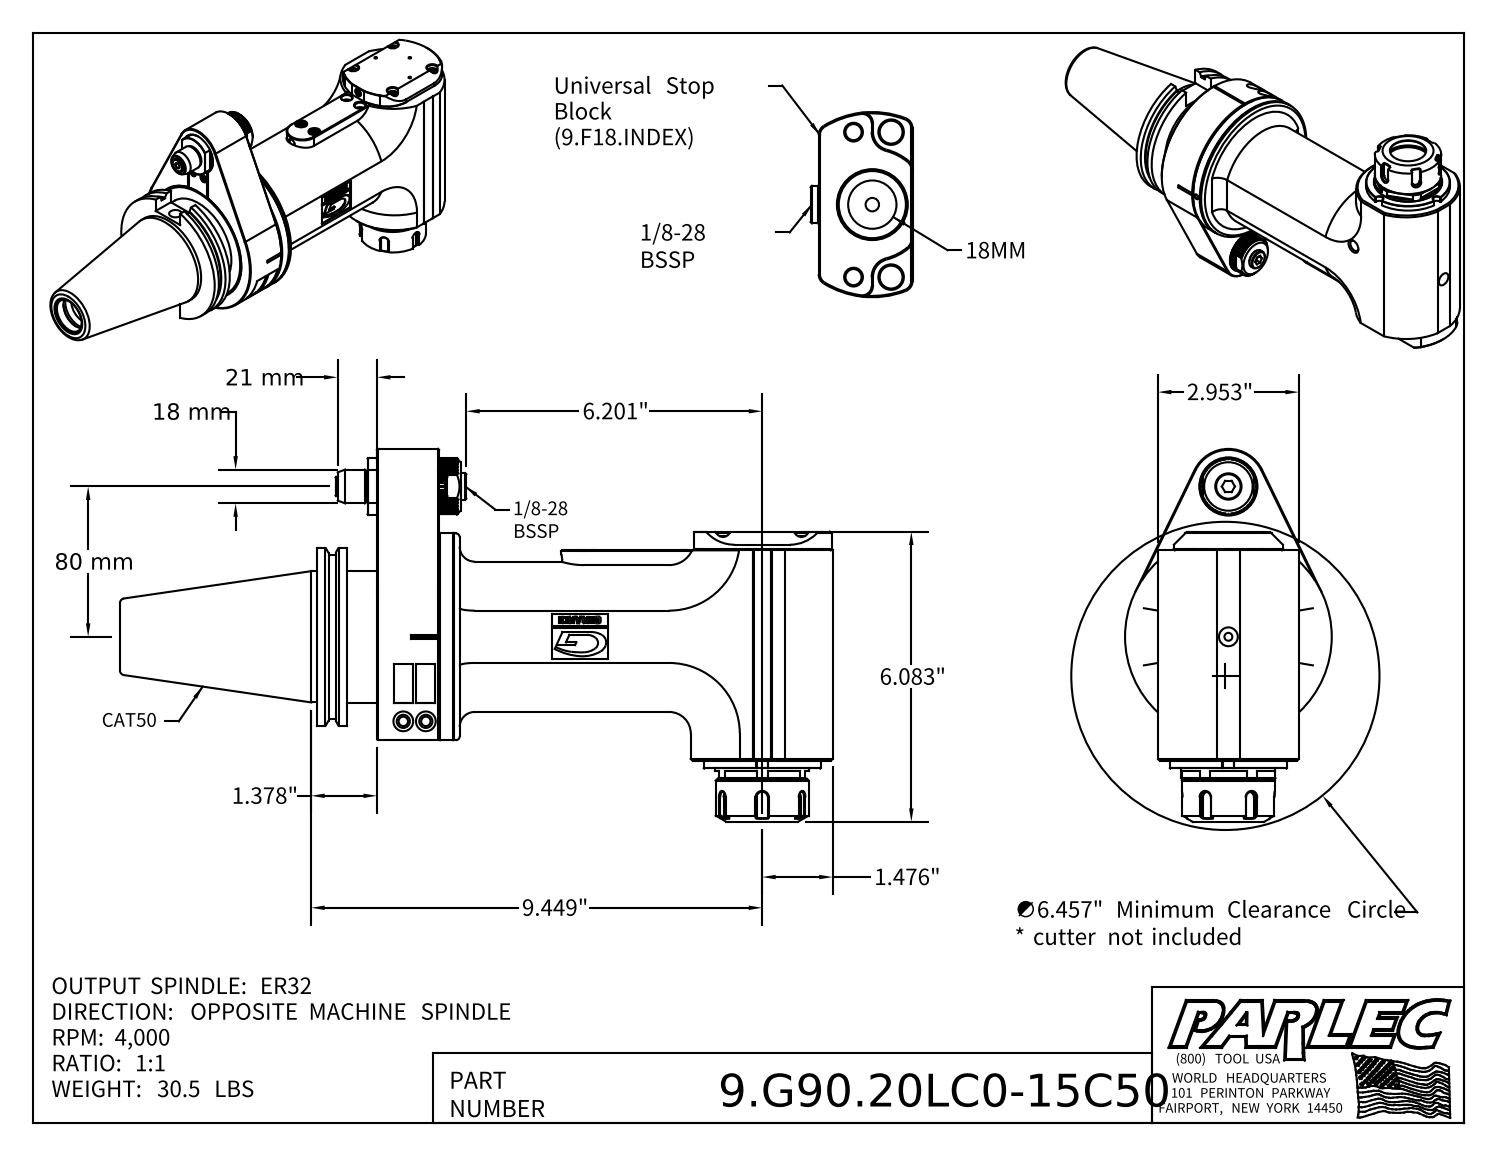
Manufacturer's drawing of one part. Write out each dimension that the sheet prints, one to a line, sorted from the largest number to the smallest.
80 mm
21 mm
18 mm
9.449"
∅6.457" Minimum Clearance Circle * cutter not included
6.201"
6.083"
2.953"
1.476"
1.378"
